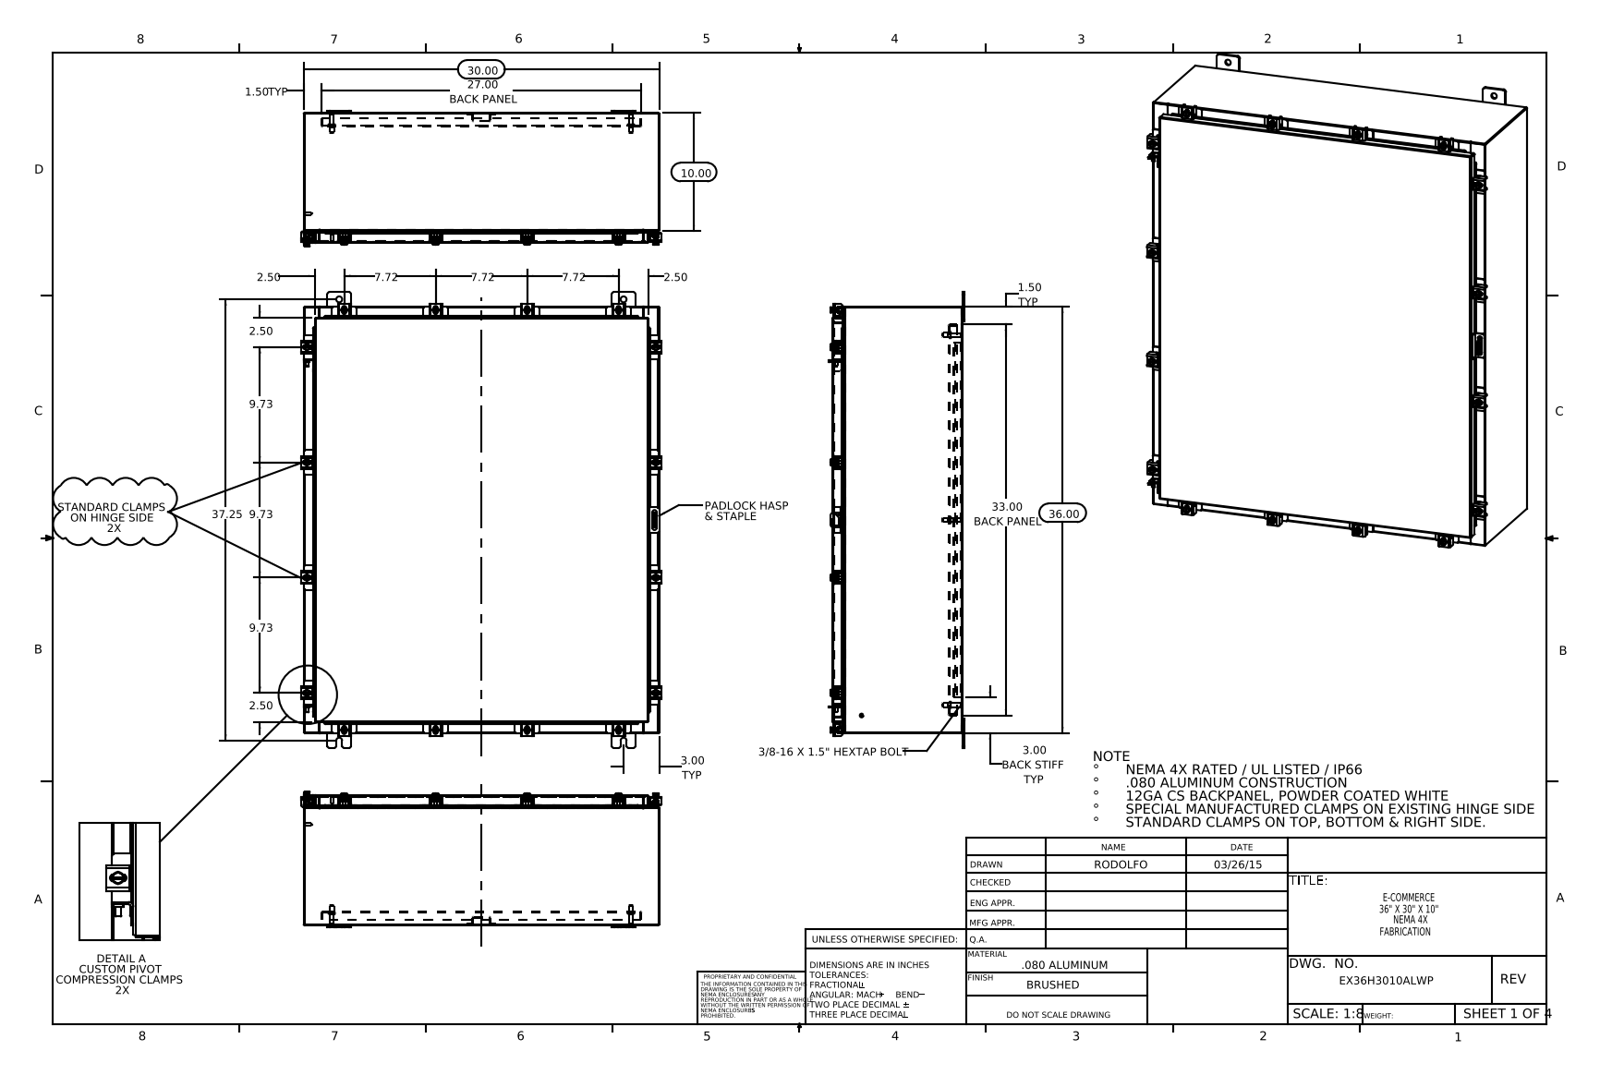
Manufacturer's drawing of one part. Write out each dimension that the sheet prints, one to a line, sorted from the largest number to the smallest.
37.25
36.00
33.00 BACK PANEL
30.00
27.00 BACK PANEL
10.00
9.73
9.73
9.73
7.72
7.72
7.72
3.00 TYP
3.00 BACK STIFF TYP
2.50
2.50
2.50
2.50
1.50 TYP
1.50 TYP
